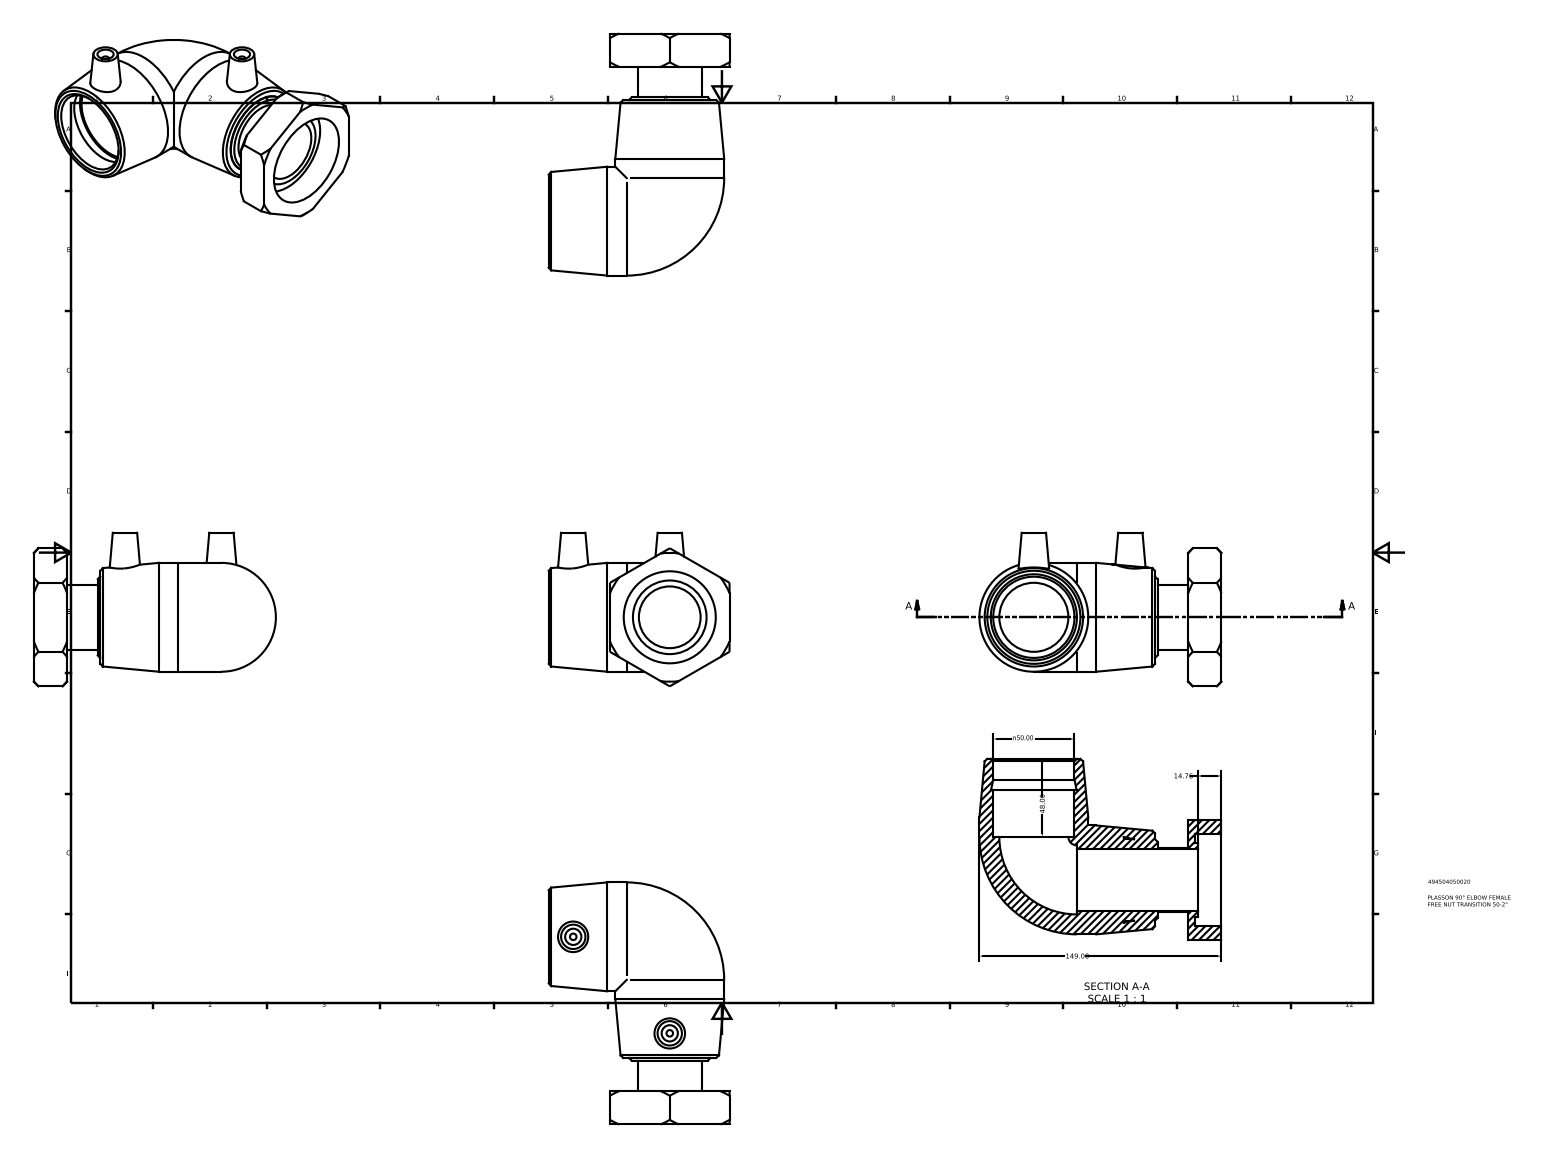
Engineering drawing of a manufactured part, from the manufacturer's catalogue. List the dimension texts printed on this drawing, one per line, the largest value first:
149.00
n50.00
48.00
14.76
